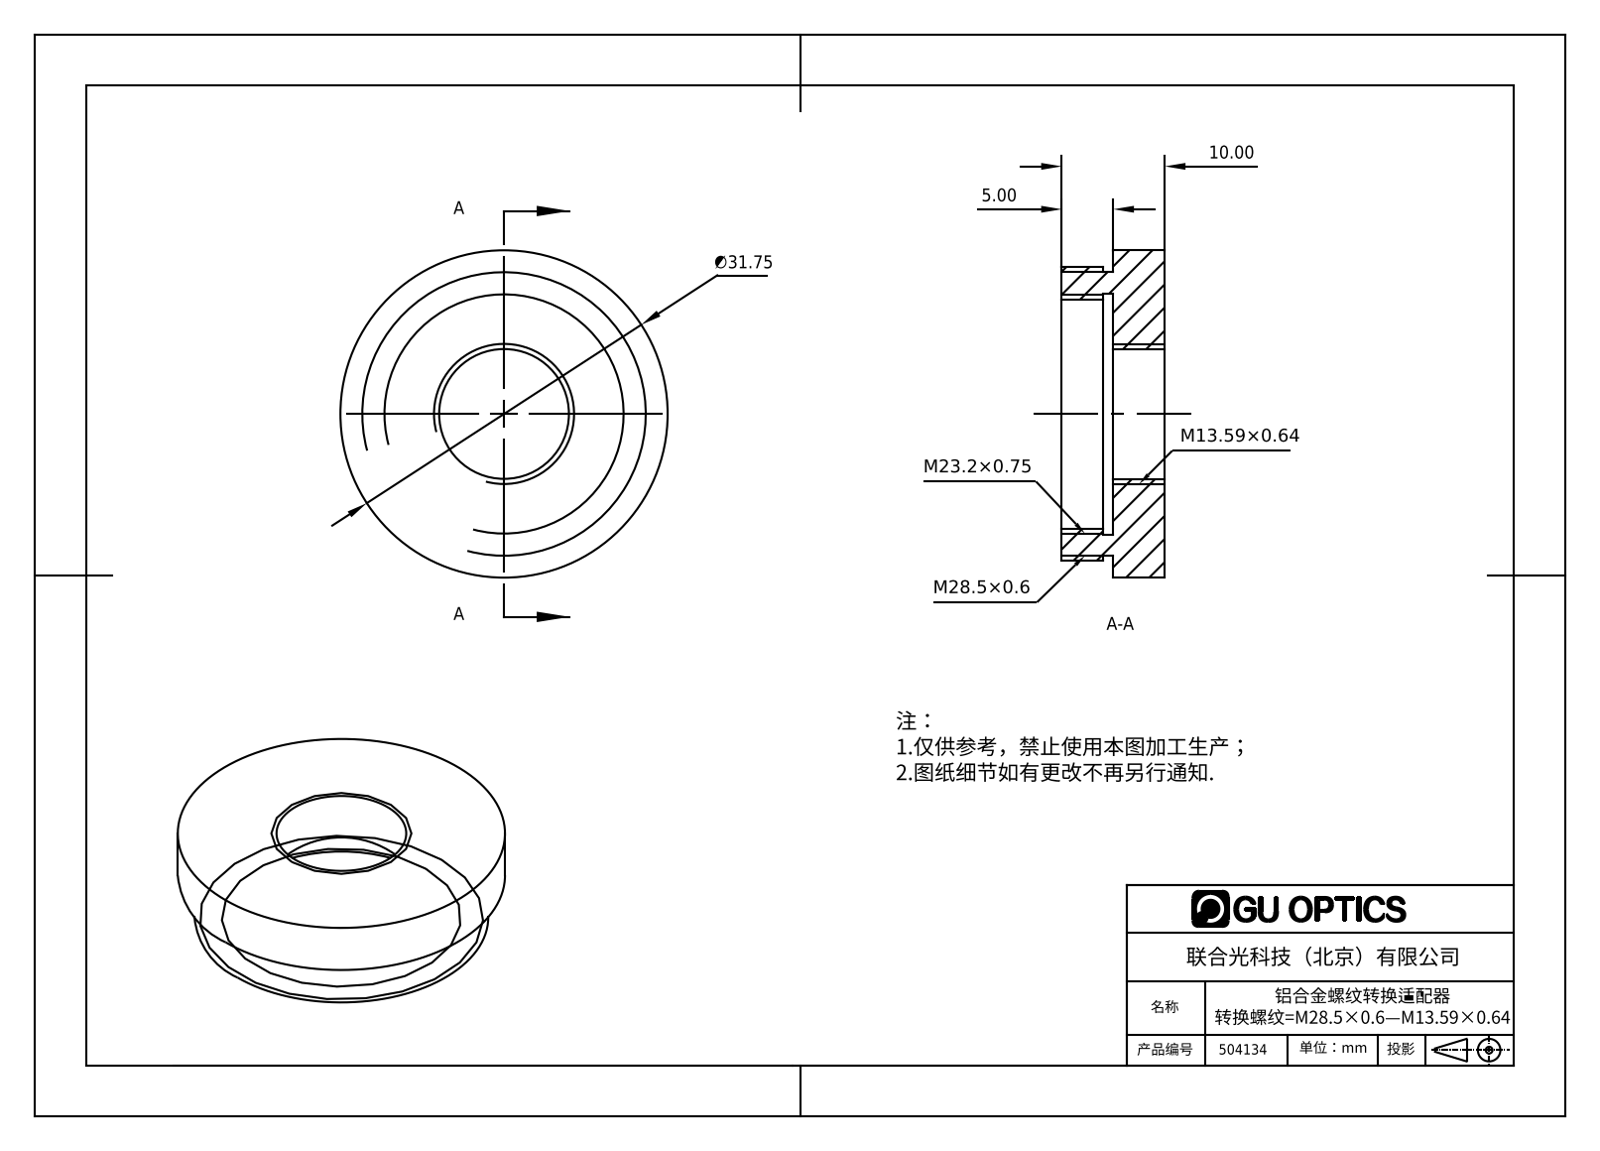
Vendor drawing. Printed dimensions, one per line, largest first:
∅31.75
10.00
5.00
